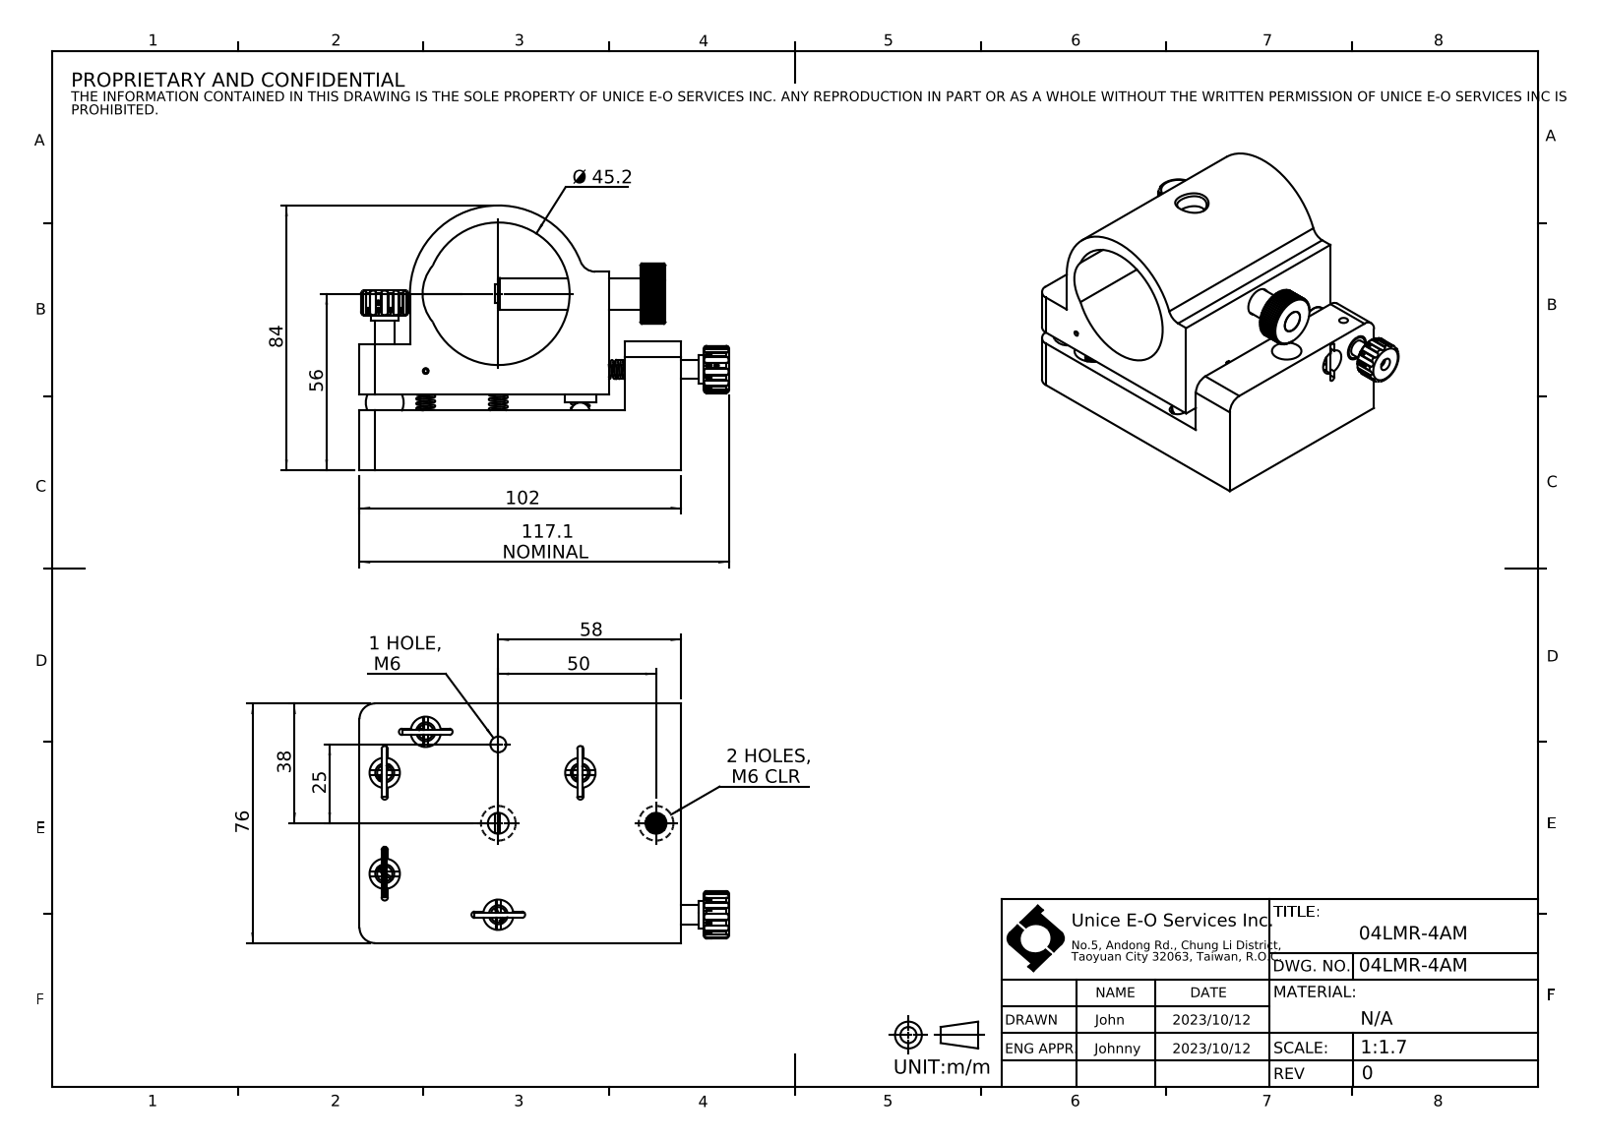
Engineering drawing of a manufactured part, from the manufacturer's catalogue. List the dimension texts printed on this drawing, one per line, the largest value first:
117.1 NOMINAL
102
84
76
58
56
50
Ø 45.2
38
25
2 HOLES, M6 CLR
1 HOLE, M6
